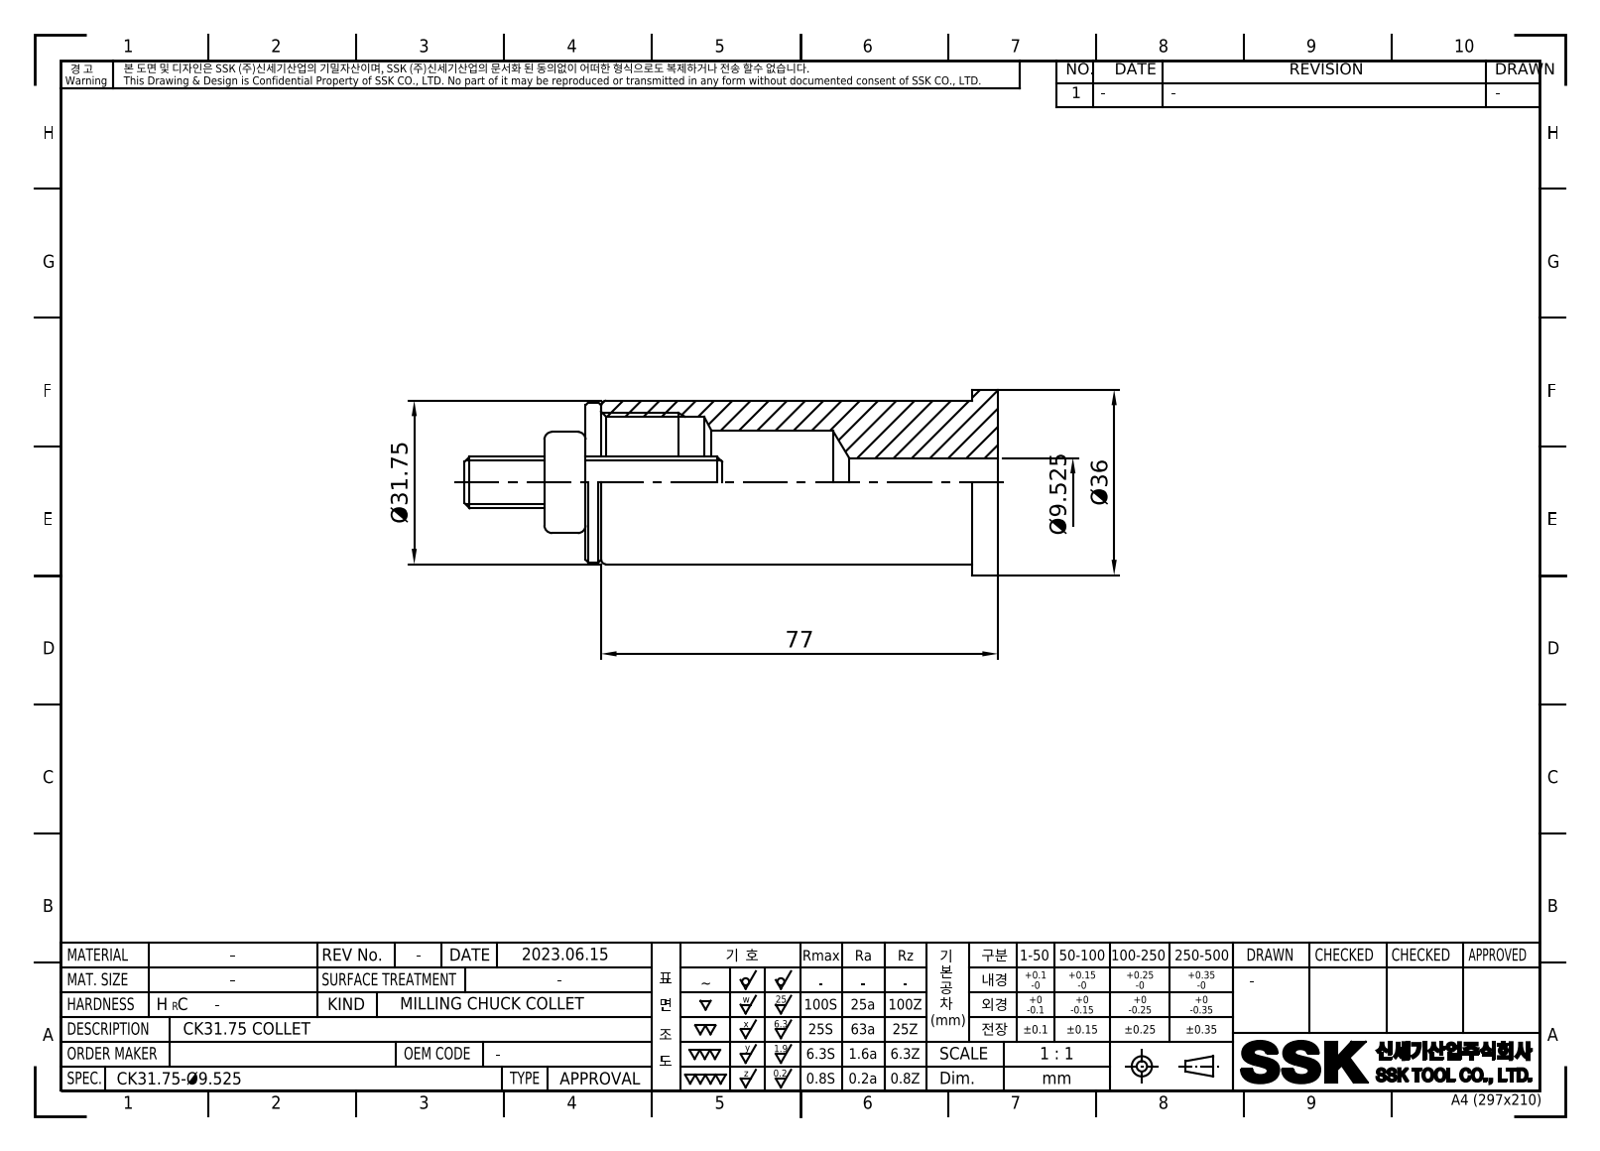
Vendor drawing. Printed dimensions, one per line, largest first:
77
Ø36
Ø31.75
Ø9.525
